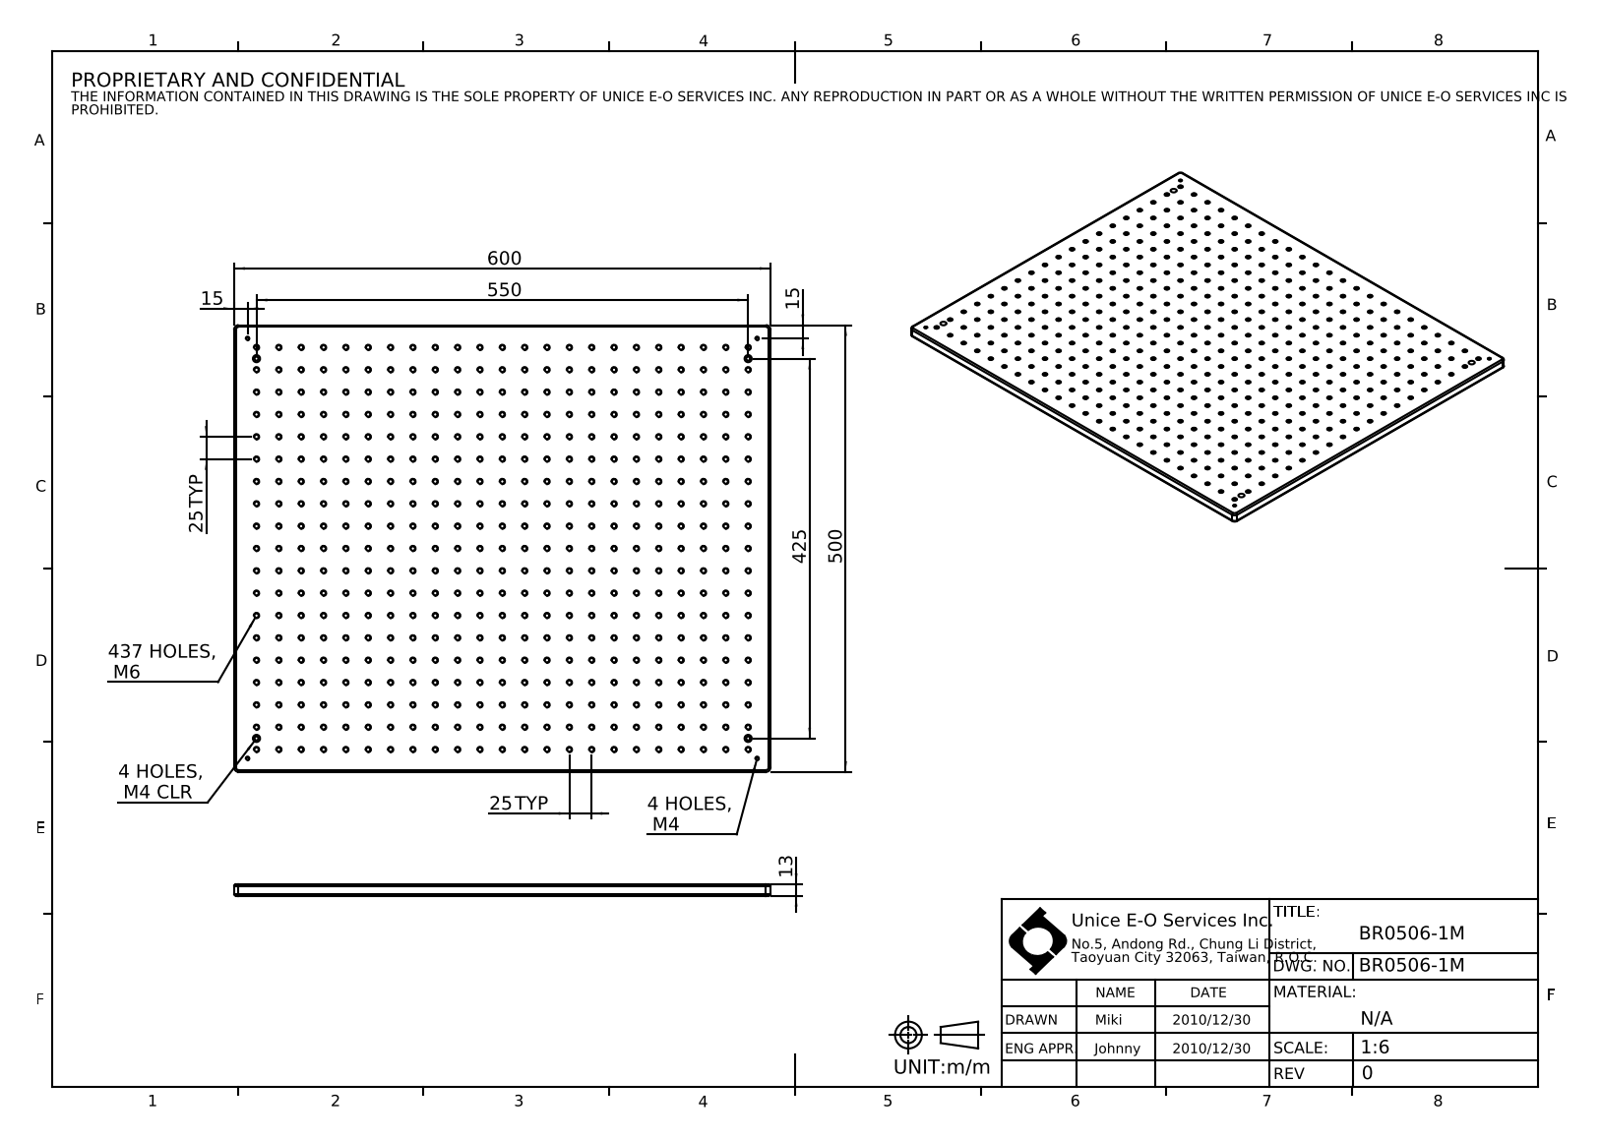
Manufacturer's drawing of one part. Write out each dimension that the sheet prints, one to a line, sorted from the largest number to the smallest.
600
550
500
437 HOLES, M6
425
25 TYP
25 TYP
15
15
13
4 HOLES, M4
4 HOLES, M4 CLR
